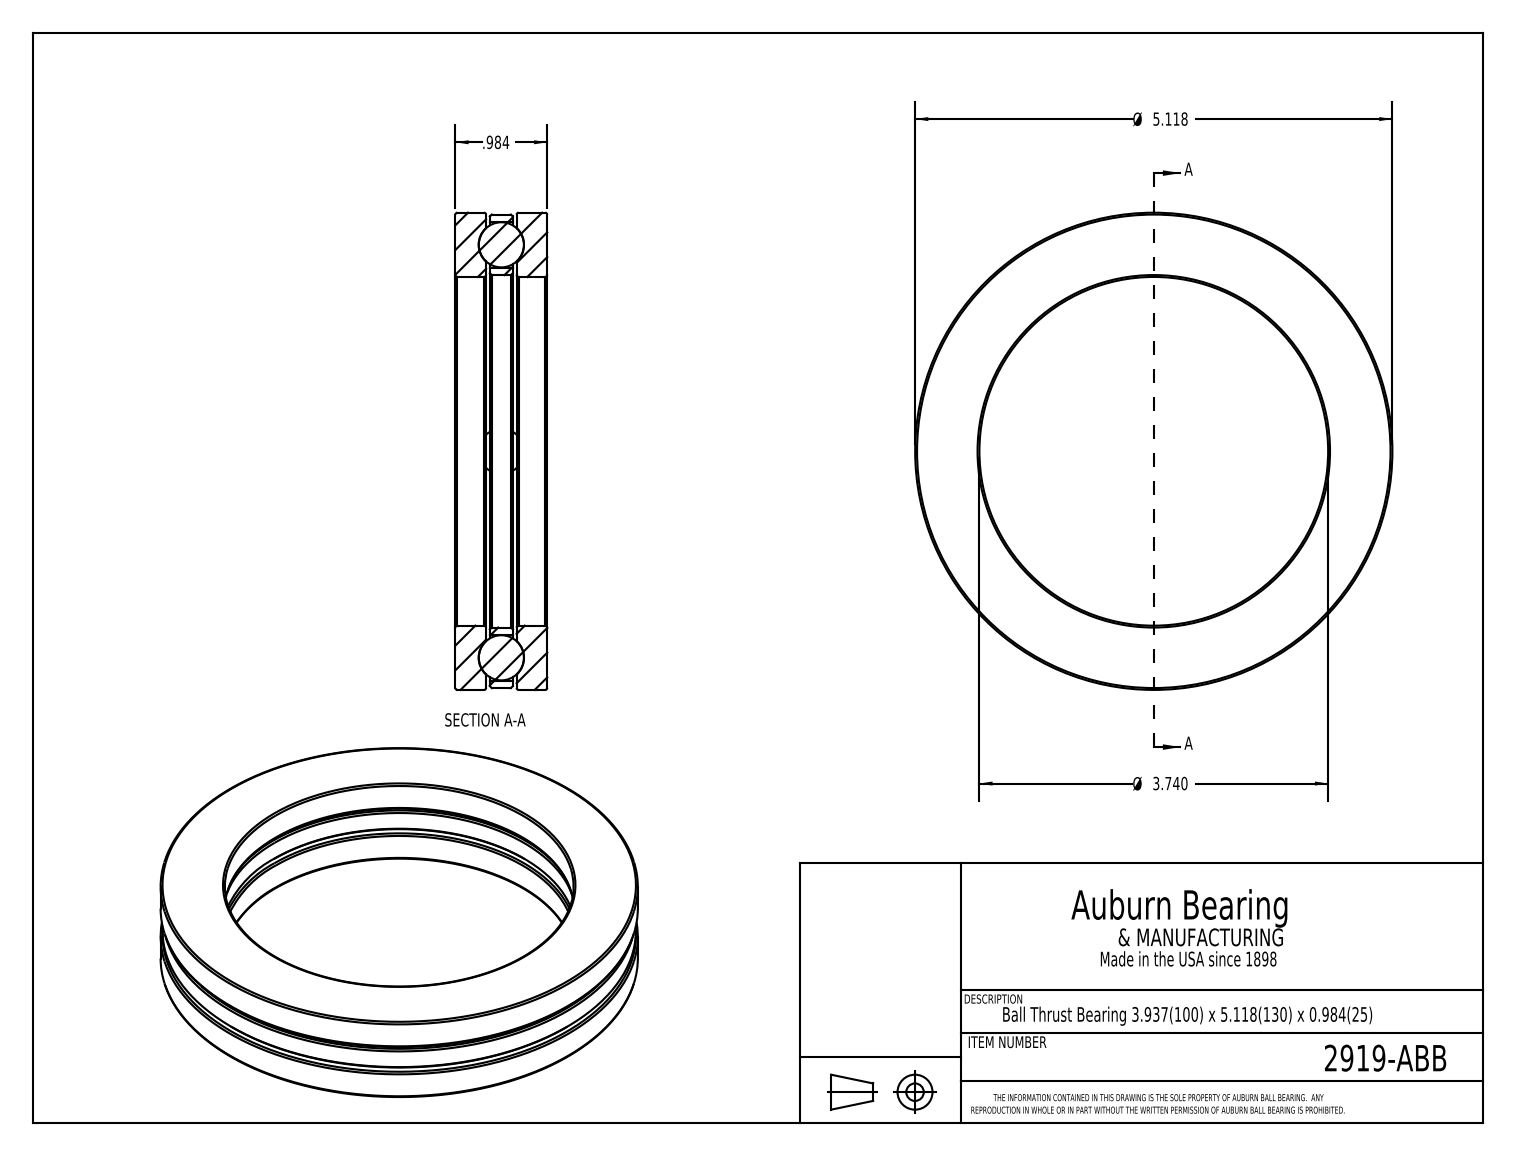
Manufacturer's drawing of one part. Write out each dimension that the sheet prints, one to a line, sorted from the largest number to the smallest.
Ø 5.118
Ø 3.740
.984
